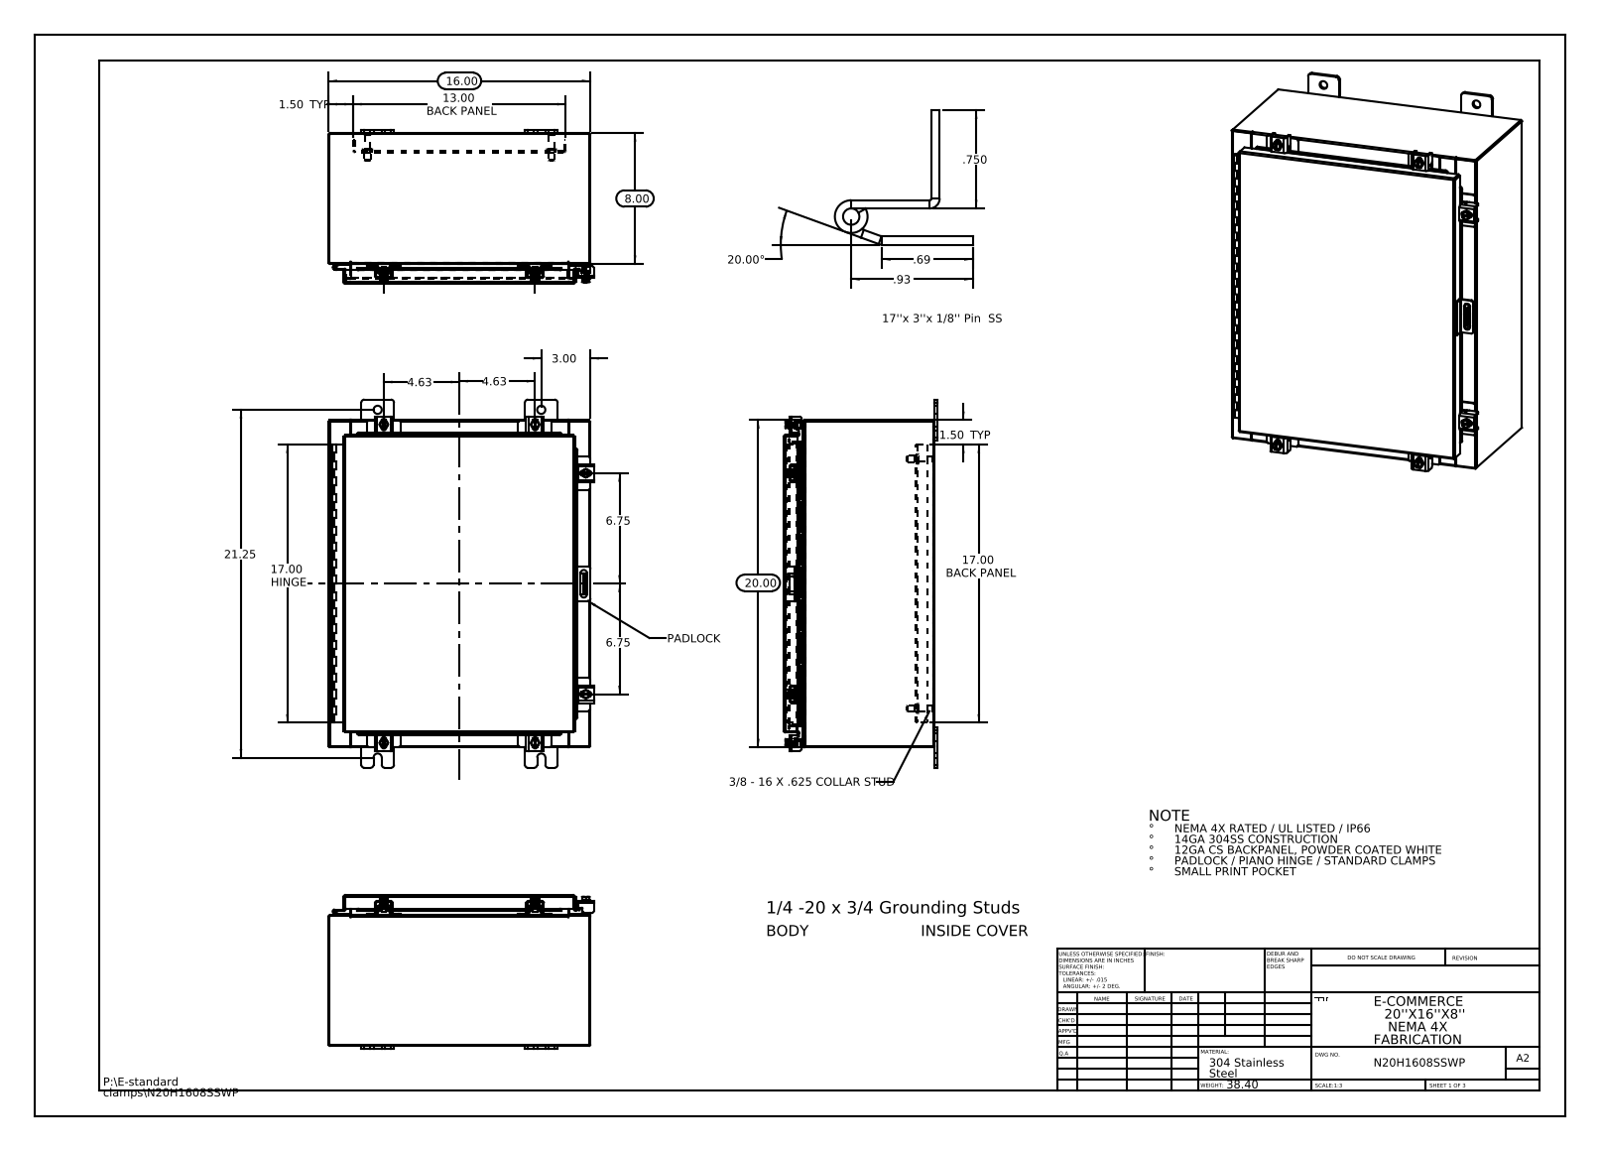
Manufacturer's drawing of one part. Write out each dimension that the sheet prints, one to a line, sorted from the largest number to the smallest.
21.25
20.00
20.00°
17.00 HINGE
17.00 BACK PANEL
16.00
13.00 BACK PANEL
8.00
6.75
6.75
4.63
4.63
3.00
1.50 TYP
1.50 TYP
.93
.750
.69
